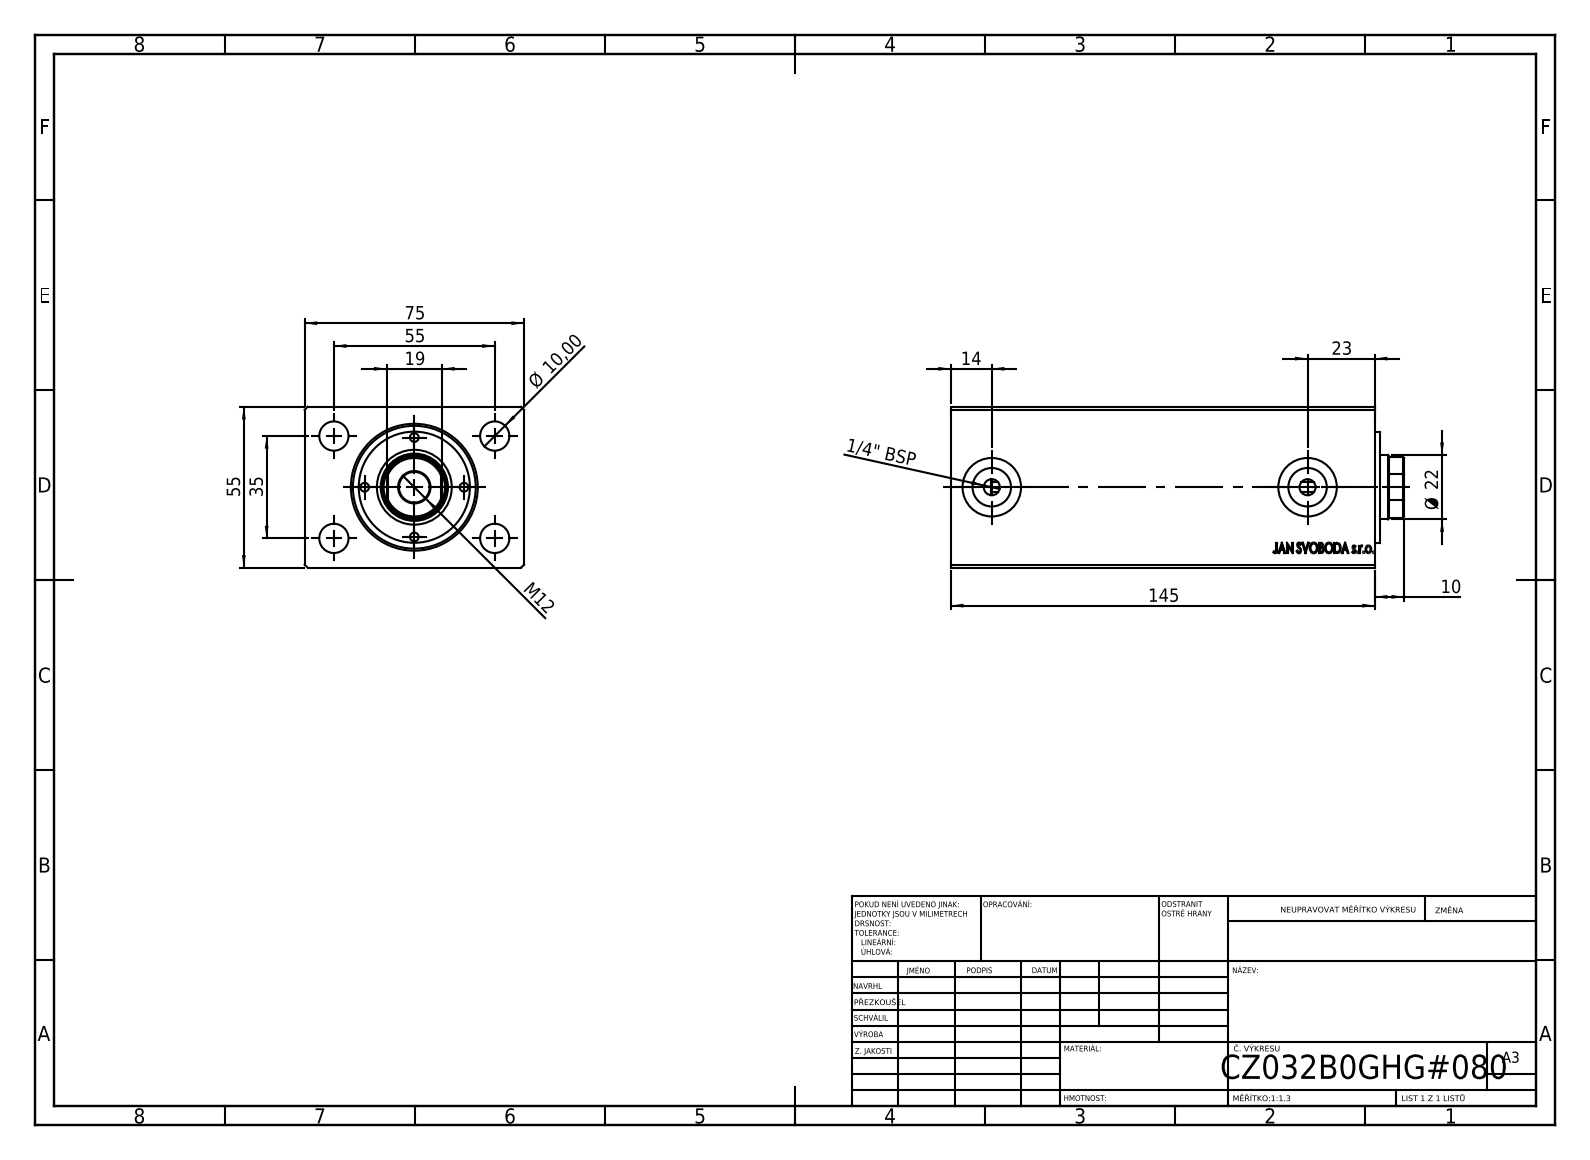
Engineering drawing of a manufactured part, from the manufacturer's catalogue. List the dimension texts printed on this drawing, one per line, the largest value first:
145
75
55
55
35
23
Ø 22
19
14
M12
Ø 10,00
10
1/4" BSP
